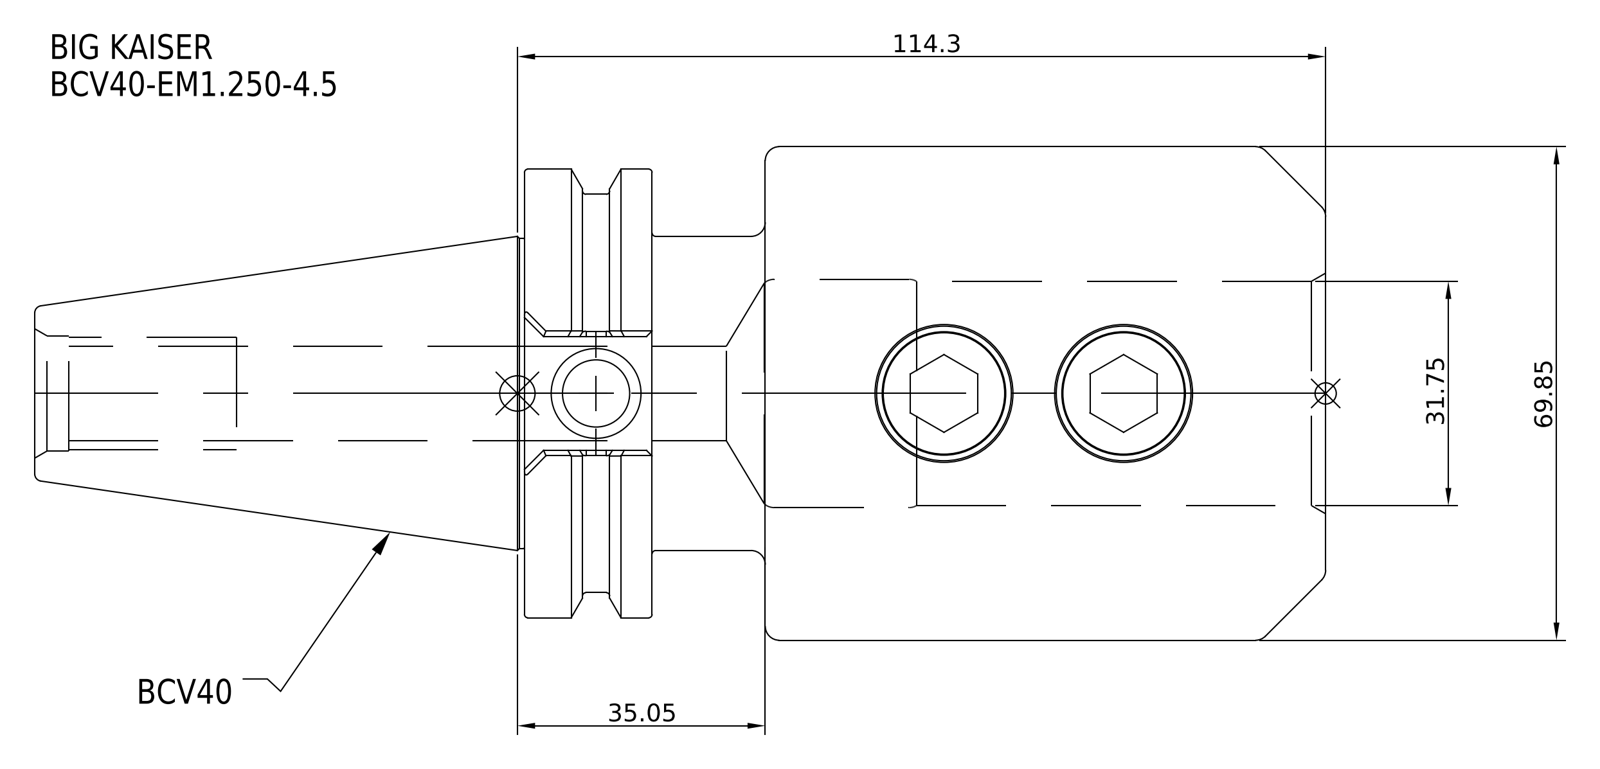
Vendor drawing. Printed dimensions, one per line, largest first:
114.3
69.85
35.05
31.75
